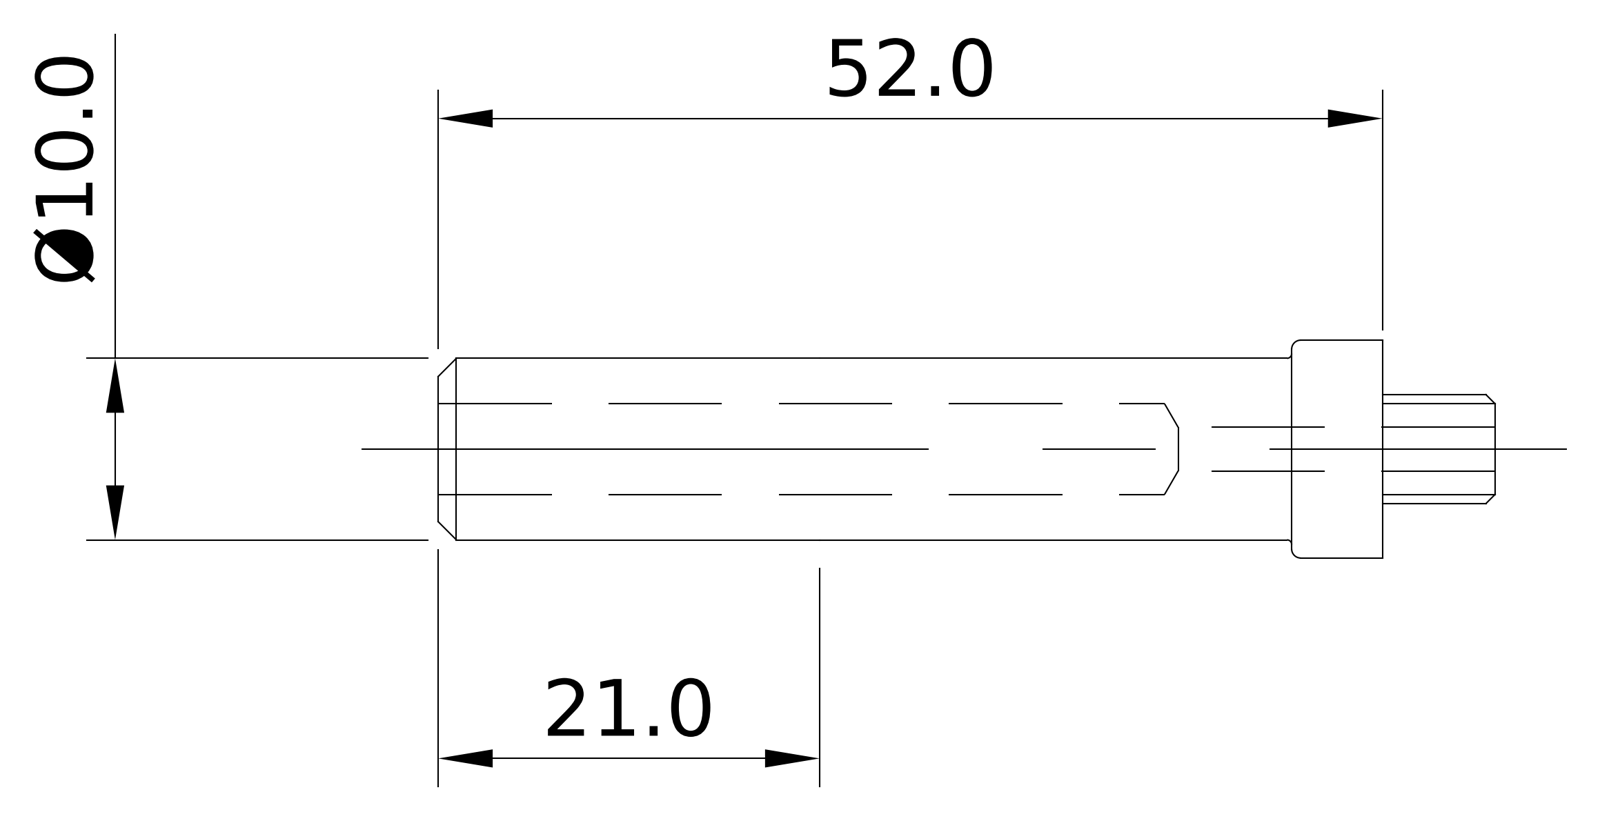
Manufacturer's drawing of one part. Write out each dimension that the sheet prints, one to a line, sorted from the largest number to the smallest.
52.0
21.0
Ø10.0
